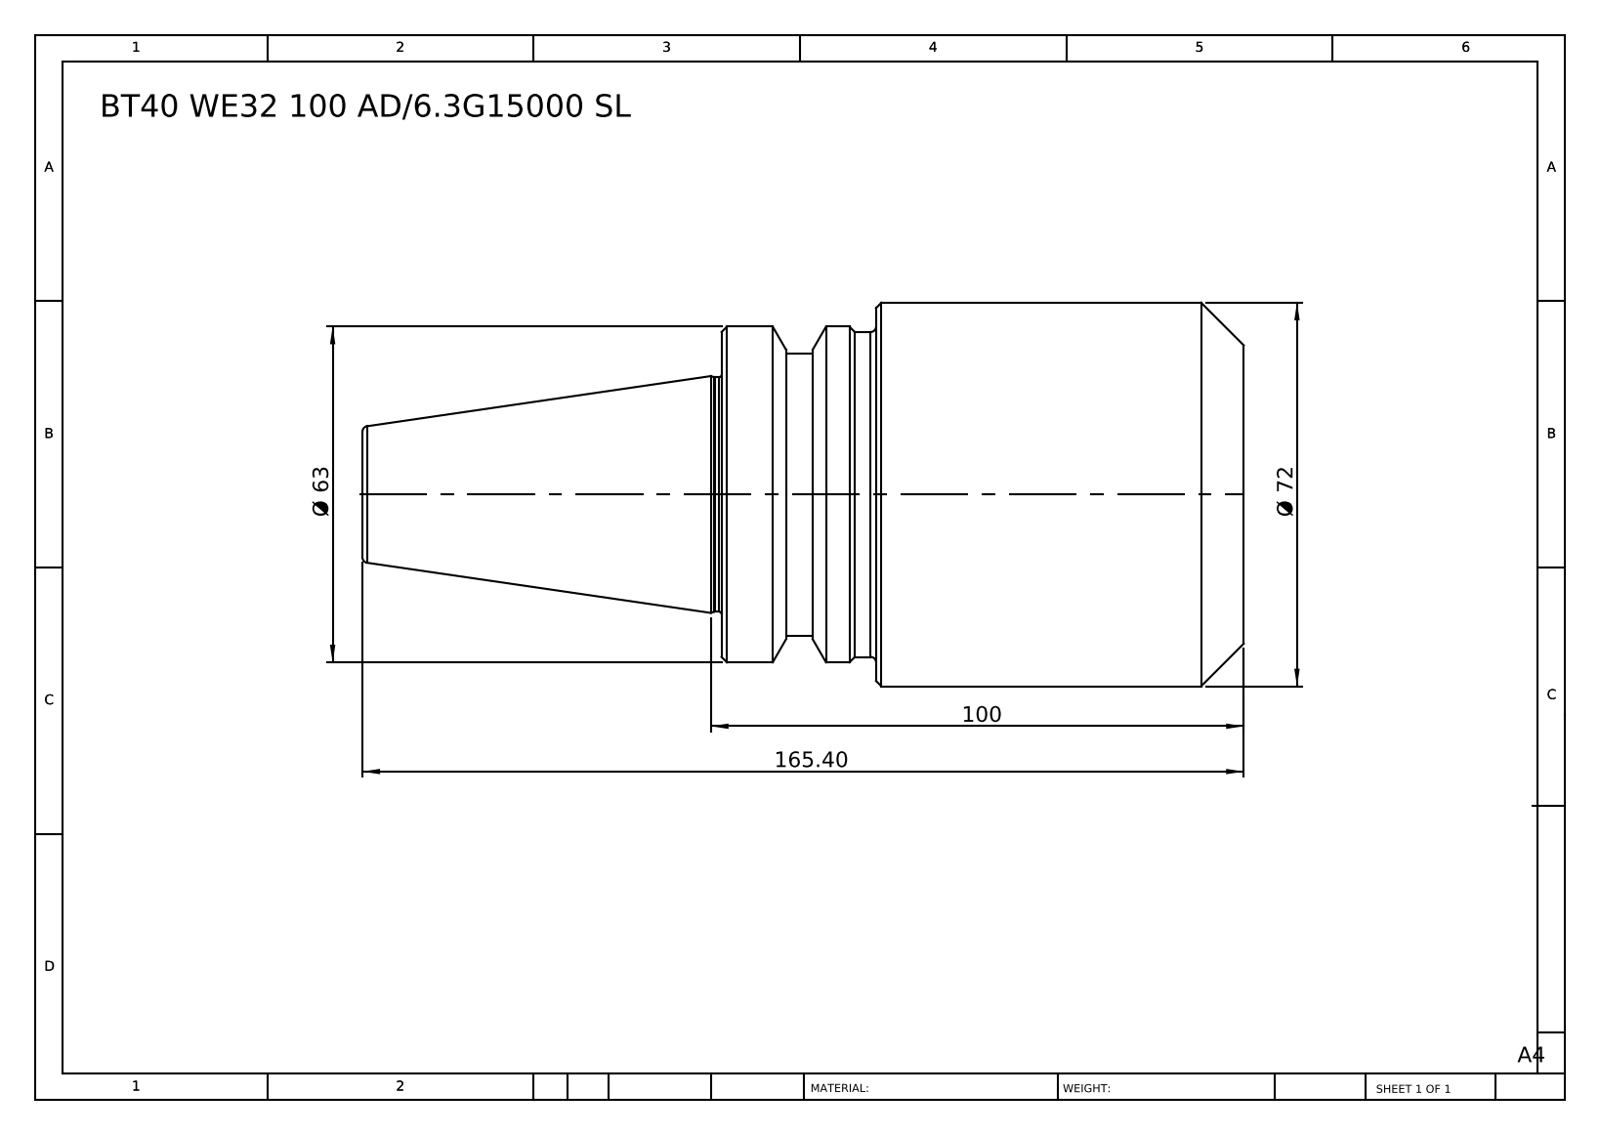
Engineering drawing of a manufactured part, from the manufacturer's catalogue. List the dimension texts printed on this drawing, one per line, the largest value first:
165.40
100
Ø 72
Ø 63
